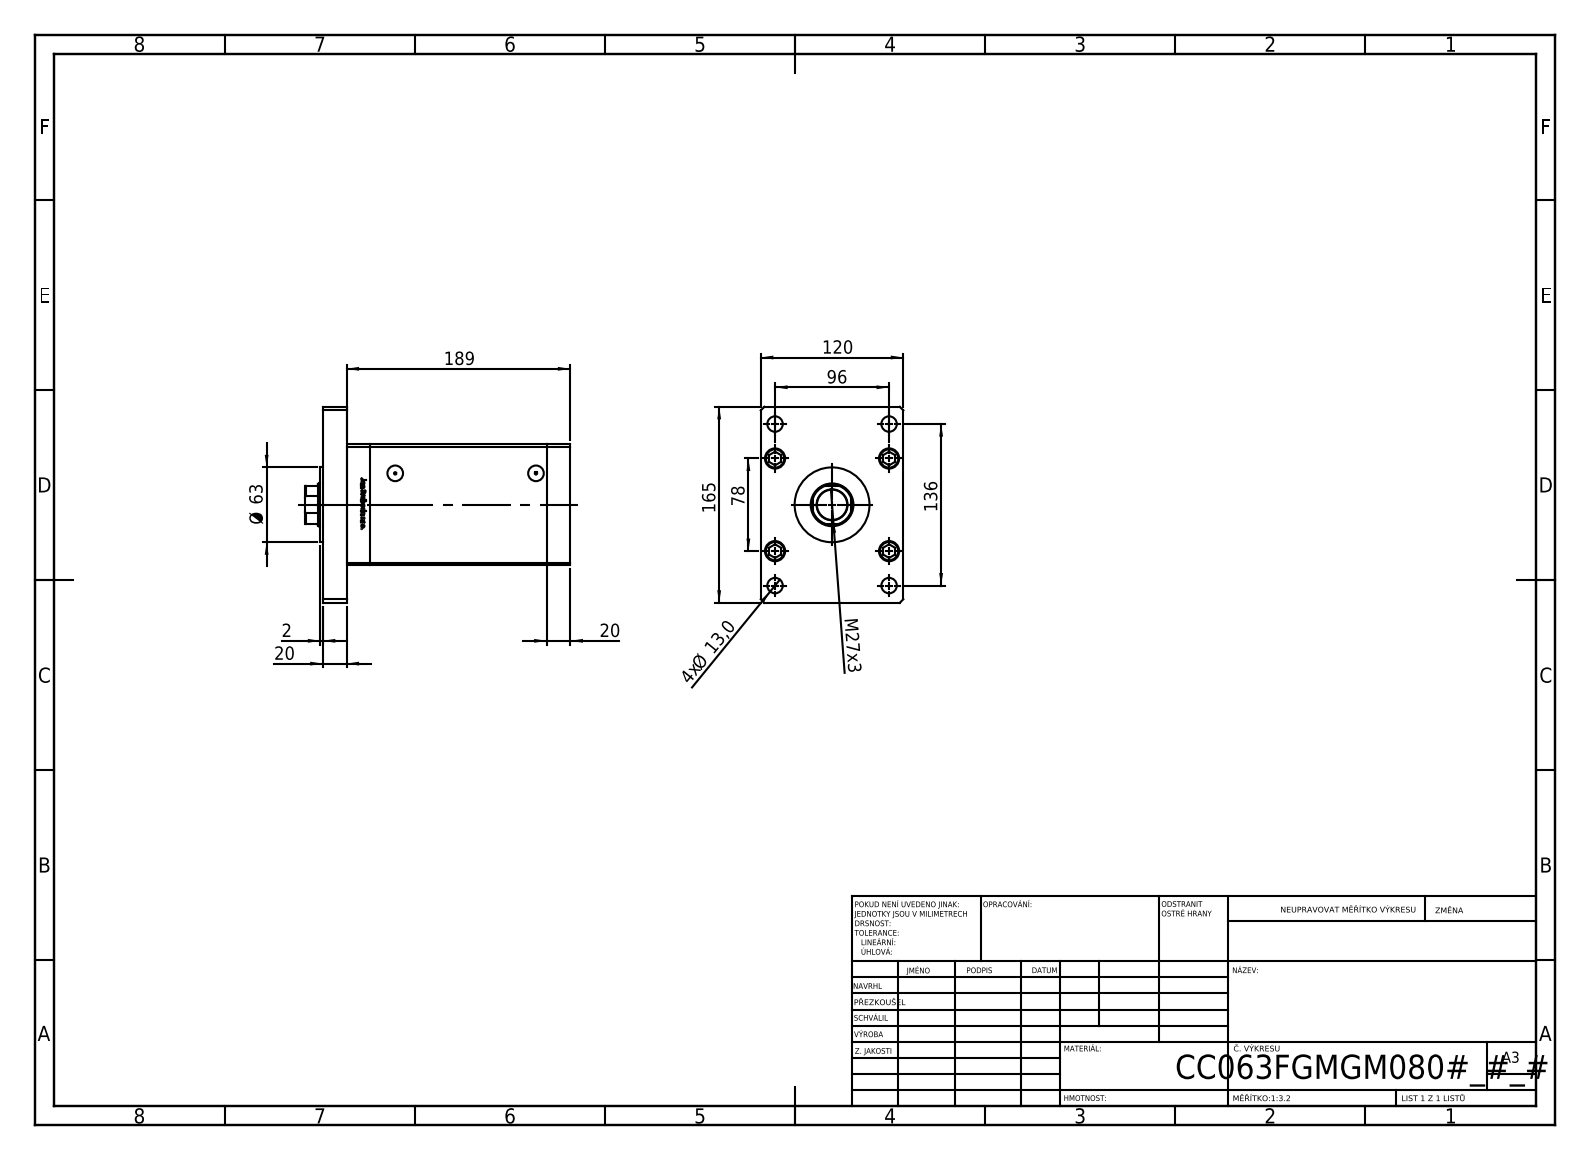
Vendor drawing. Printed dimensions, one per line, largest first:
189
165
136
120
96
78
Ø 63
M27x3
20
20
4x Ø 13,0
2
